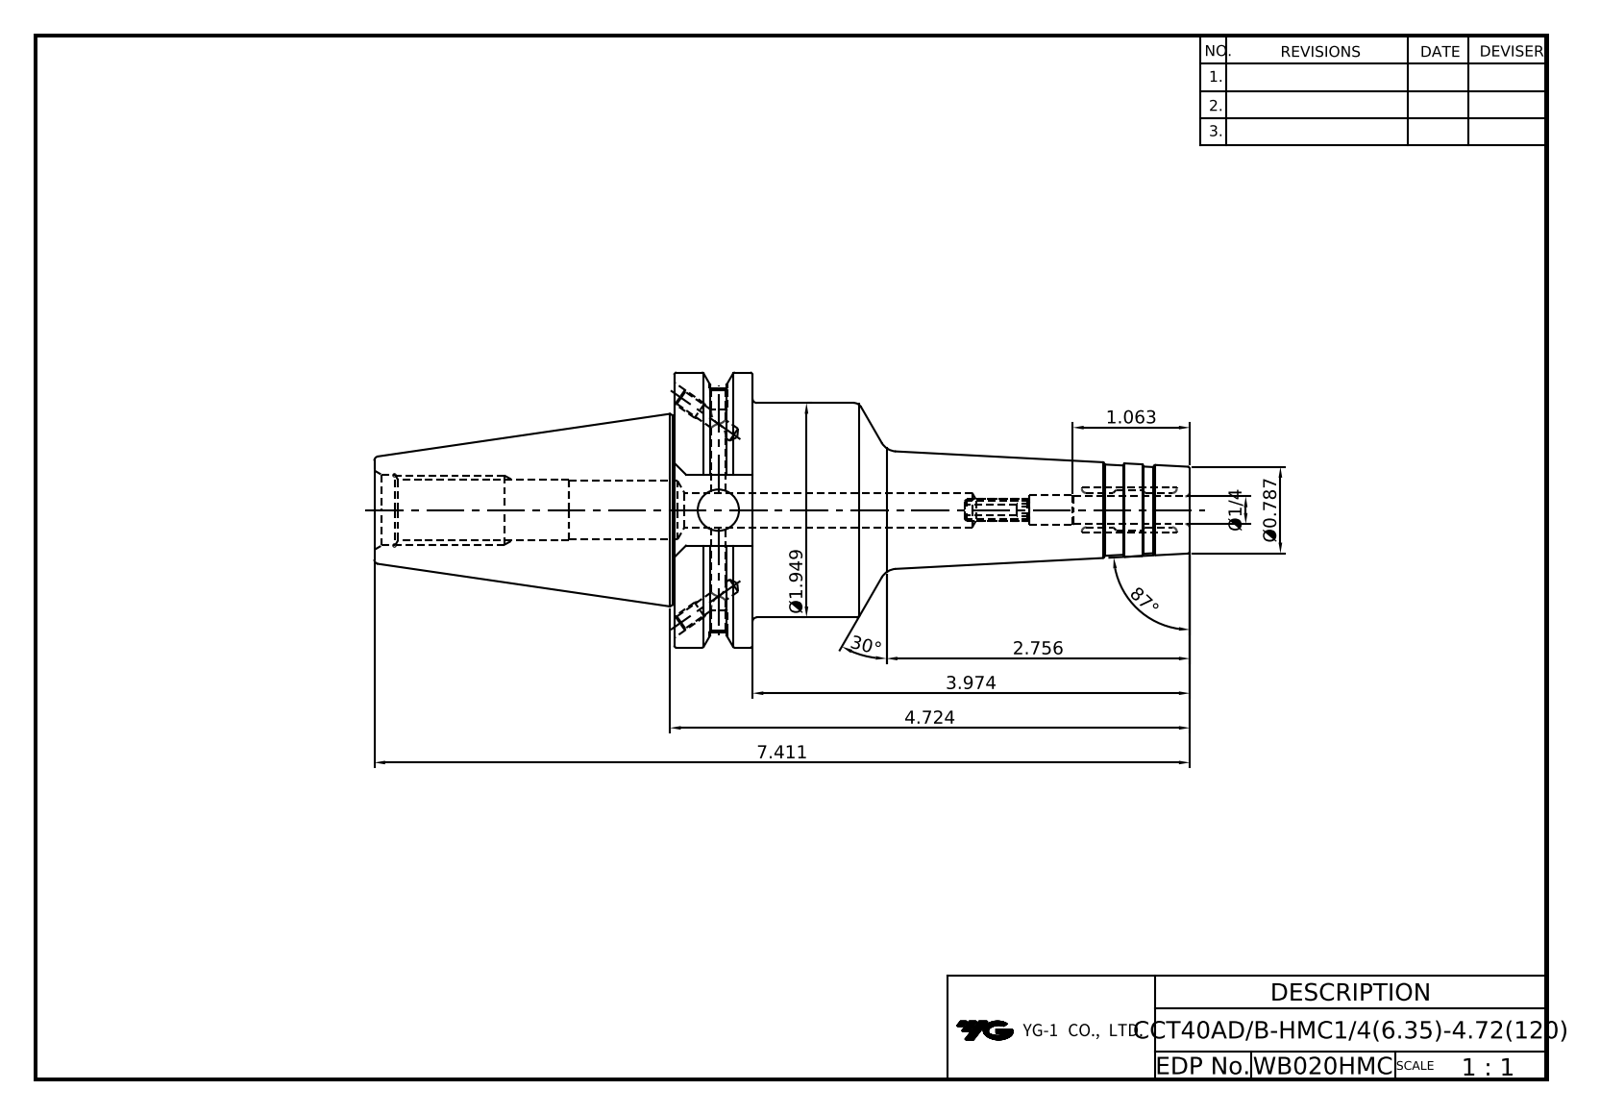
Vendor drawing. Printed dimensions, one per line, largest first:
87°
30°
7.411
4.724
3.974
2.756
Ø1.949
1.063
Ø0.787
Ø1/4
